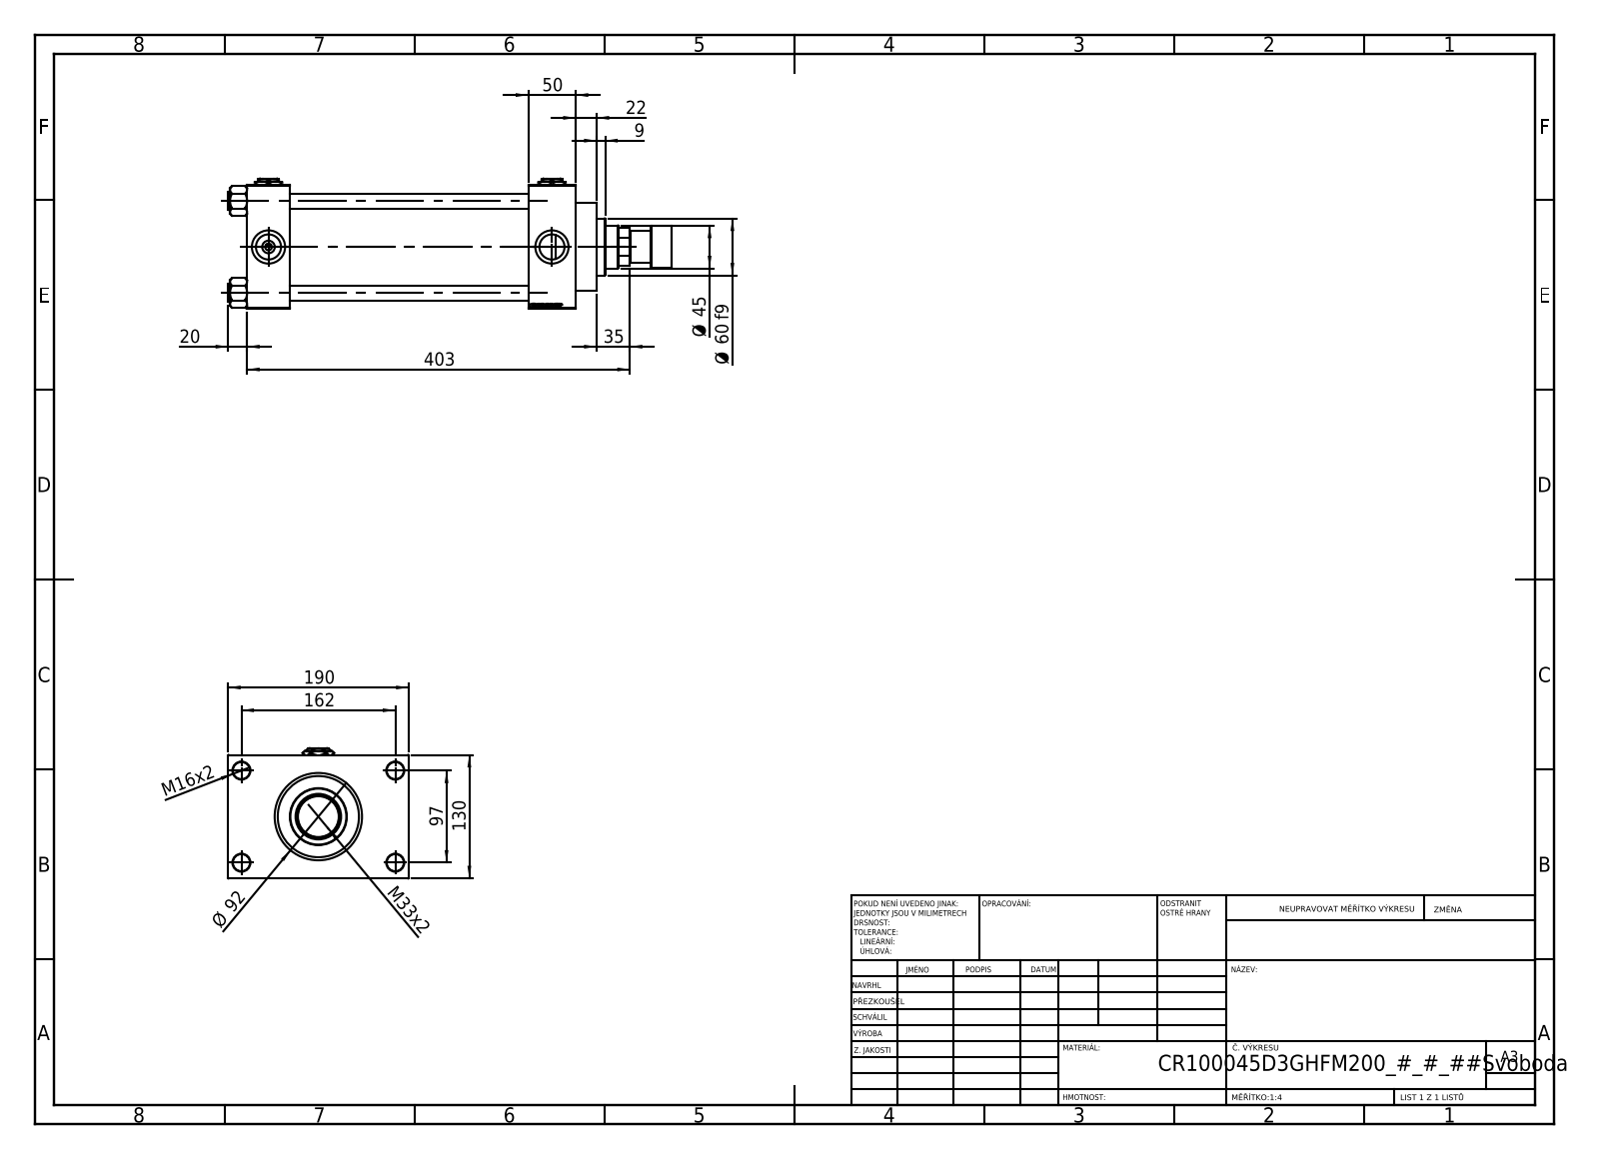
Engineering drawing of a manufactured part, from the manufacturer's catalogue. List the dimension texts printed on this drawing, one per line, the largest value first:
403
190
162
130
97
Ø 92
Ø 60 f9
50
Ø 45
35
M33x2
22
20
M16x2
9
